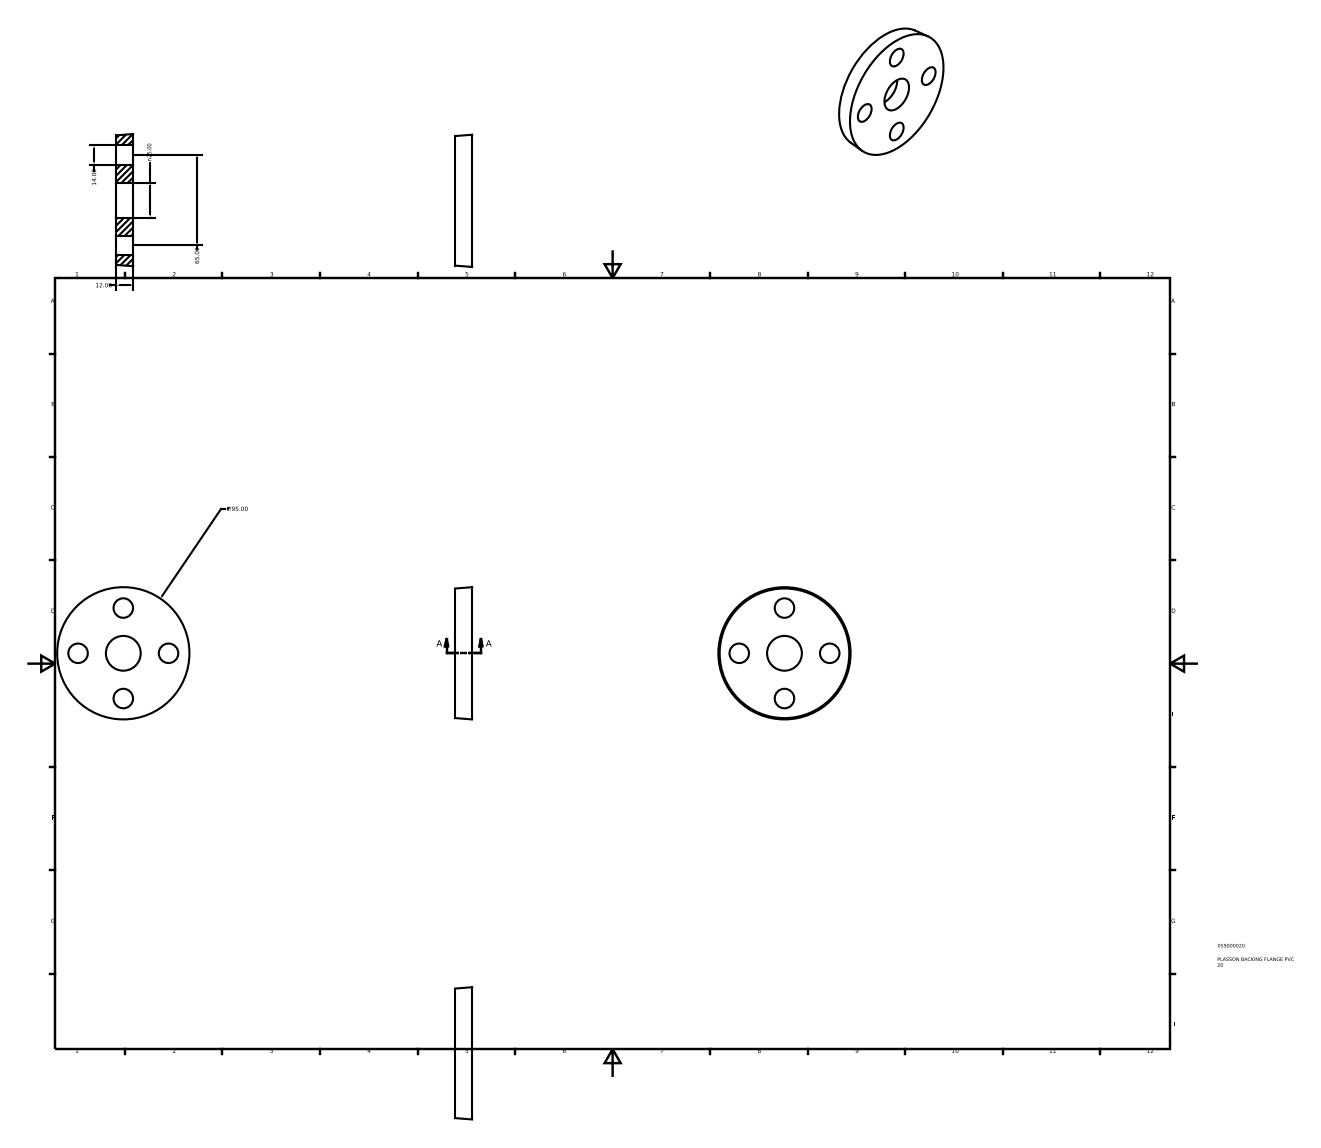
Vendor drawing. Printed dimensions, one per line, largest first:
∅95.00
65.00
n25.00
14.00
12.00
